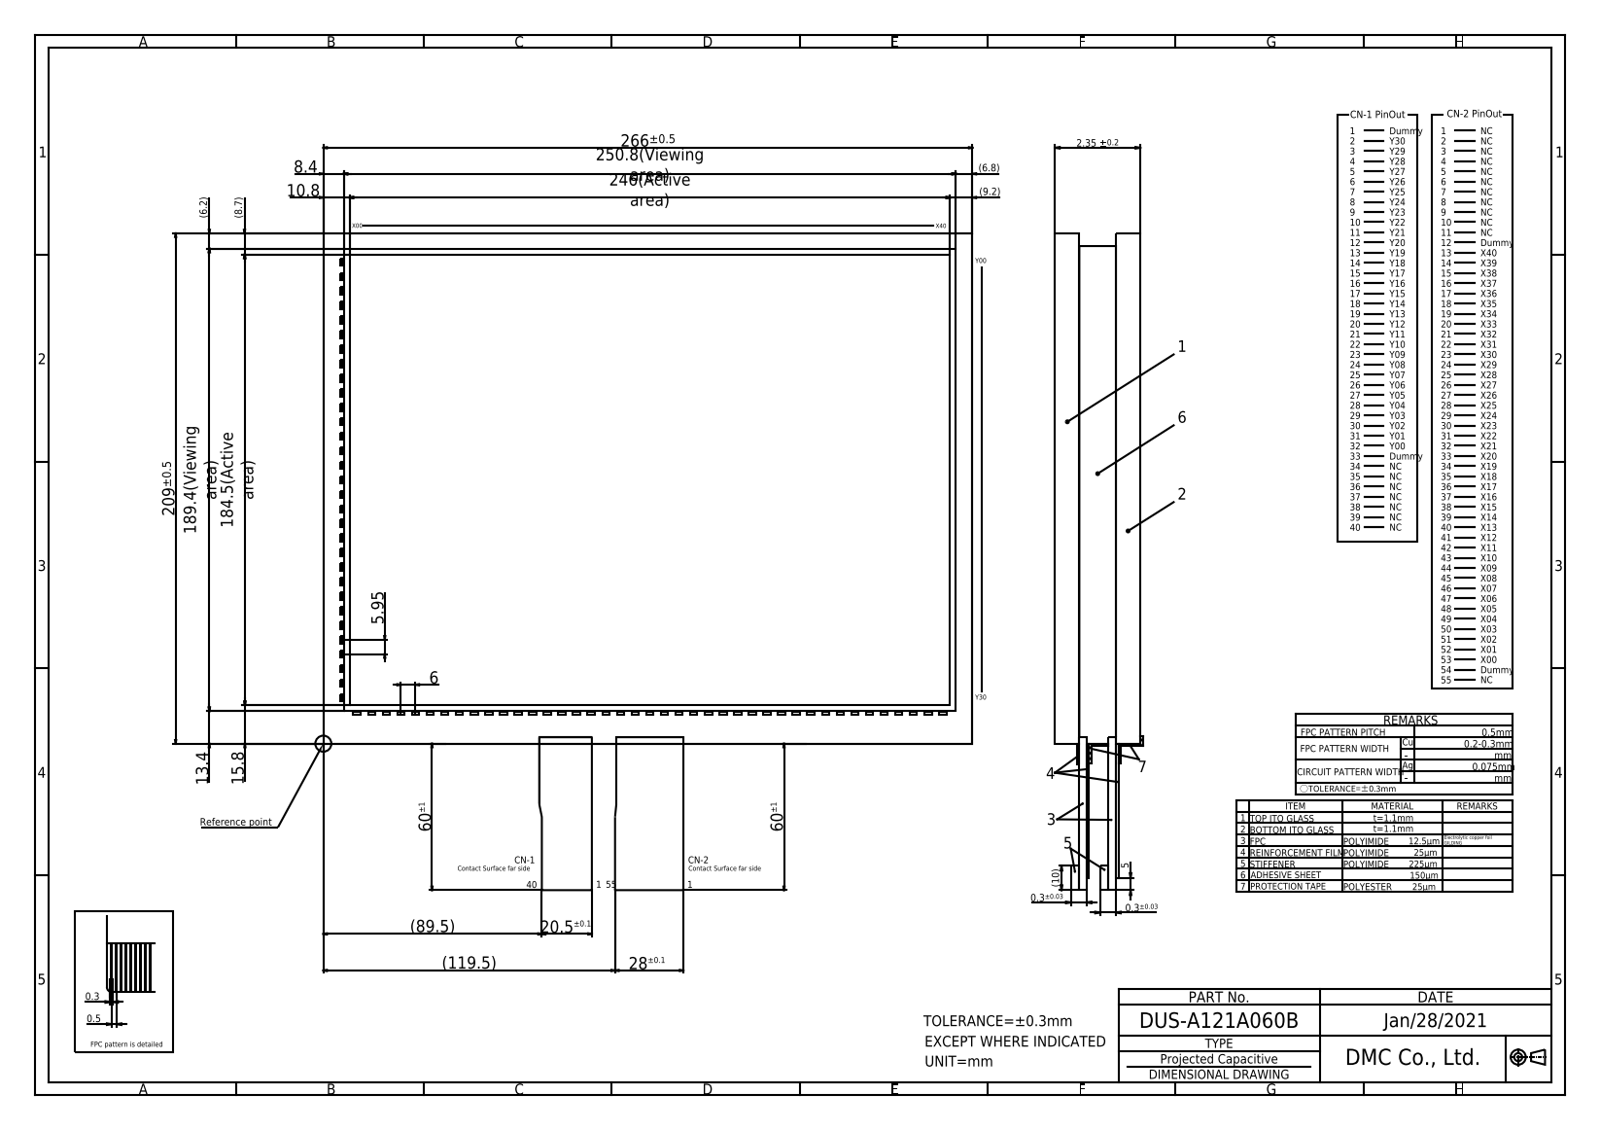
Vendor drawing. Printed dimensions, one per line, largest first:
266±0.5
250.8(Viewing area)
246(Active area)
209±0.5
189.4(Viewing area)
184.5(Active area)
(119.5)
(89.5)
60±1
60±1
28±0.1
20.5±0.1
15.8
13.4
10.8
(10)
(9.2)
(8.7)
8.4
(6.8)
(6.2)
6
5.95
5
2.35 ±0.2
0.5
0.3
0.3±0.03
0.3±0.03
